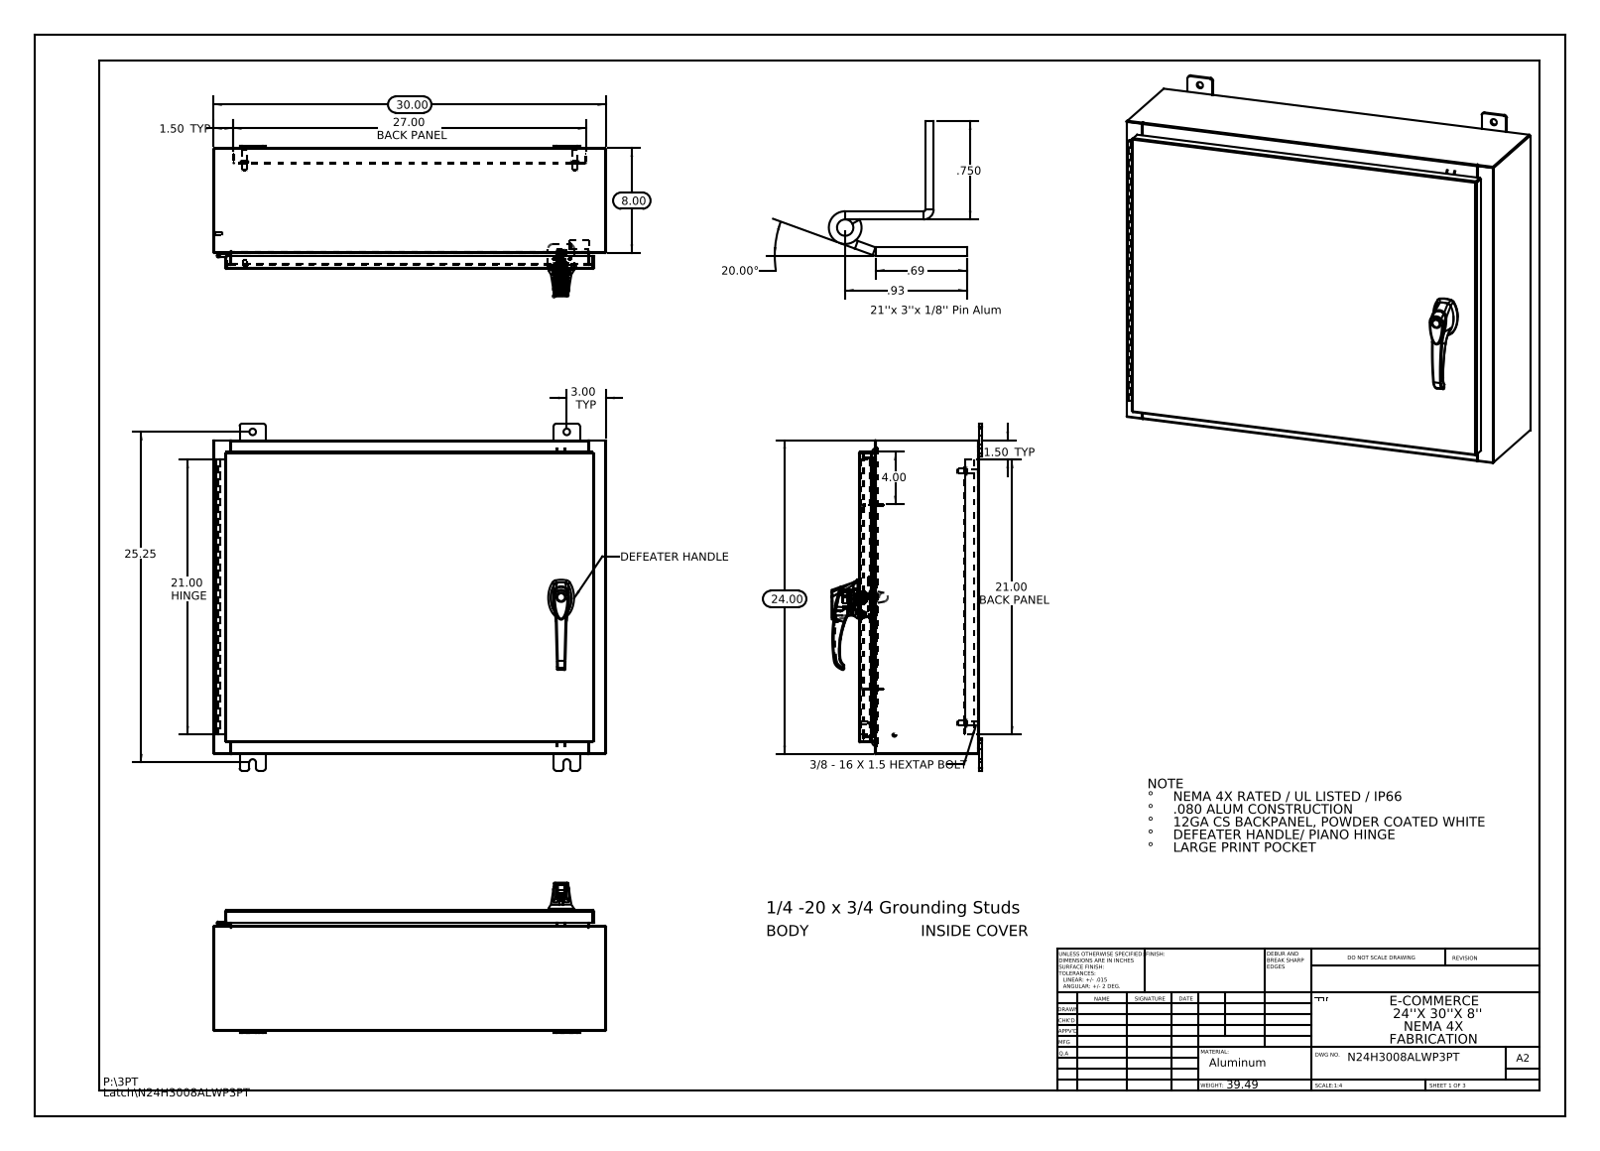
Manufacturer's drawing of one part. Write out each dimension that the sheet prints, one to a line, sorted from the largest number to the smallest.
30.00
27.00 BACK PANEL
25.25
24.00
21.00 HINGE
21.00 BACK PANEL
20.00°
8.00
4.00
3.00 TYP
1.50 TYP
1.50 TYP
.93
.750
.69
